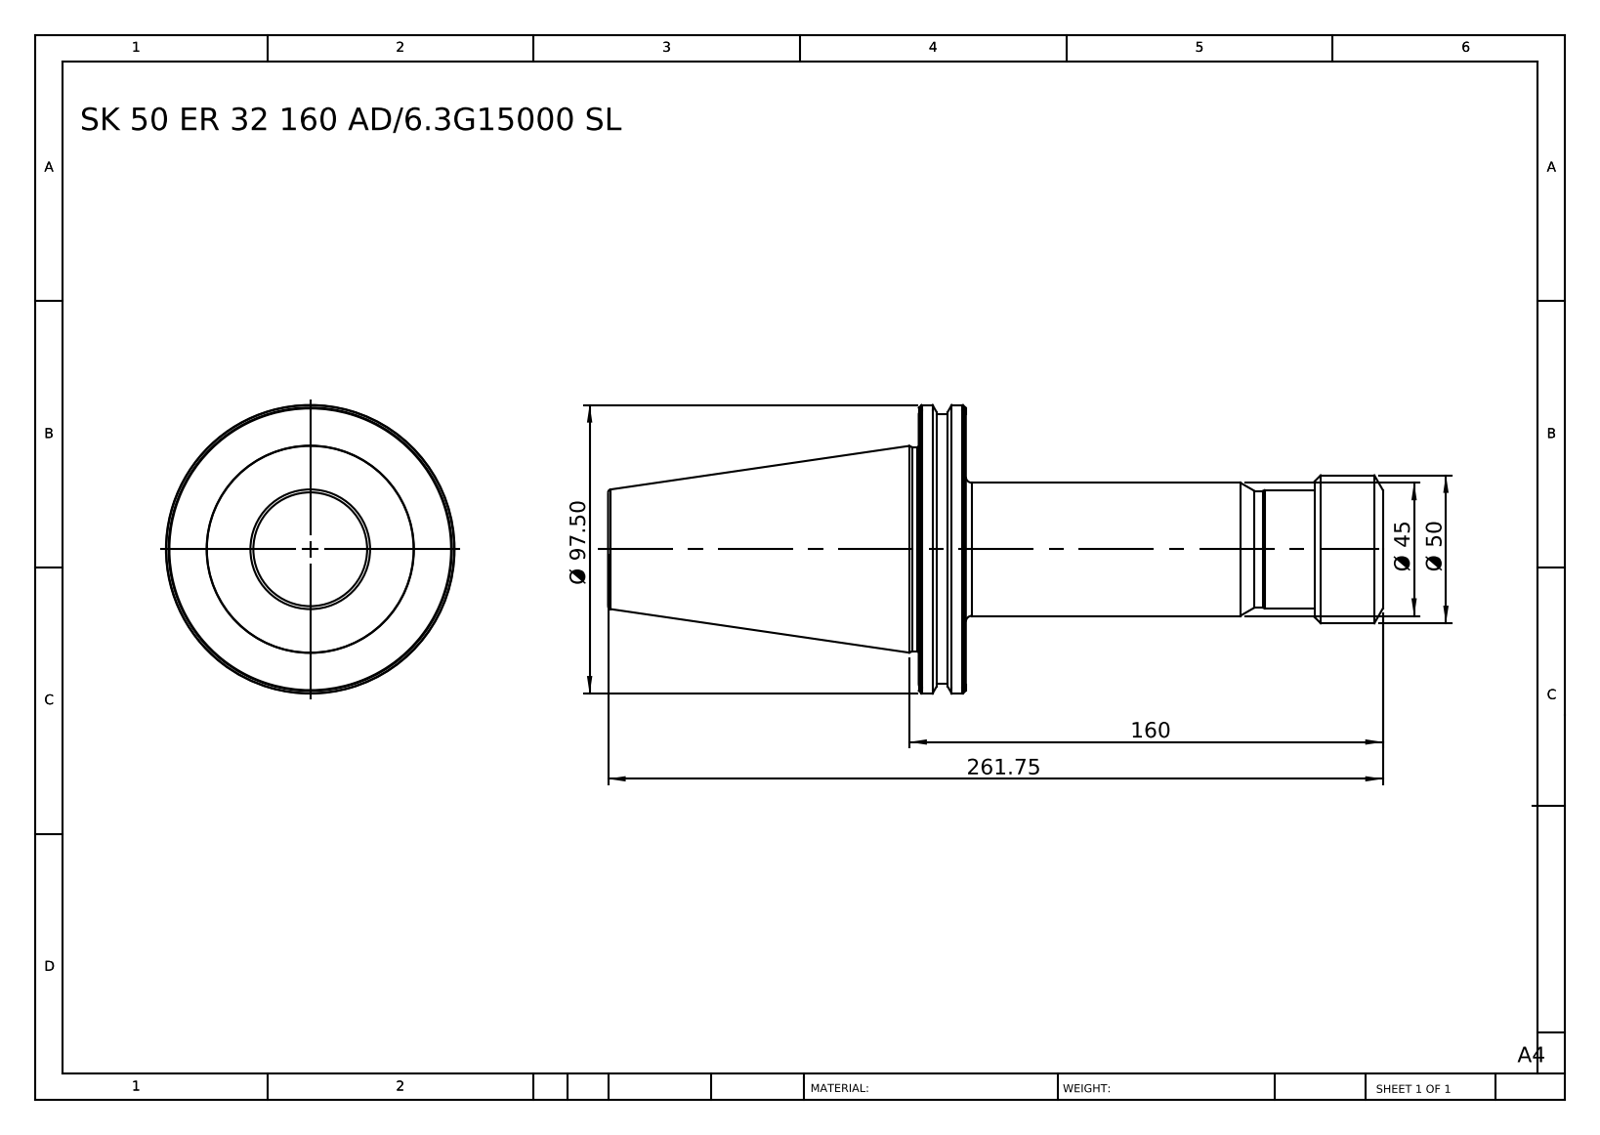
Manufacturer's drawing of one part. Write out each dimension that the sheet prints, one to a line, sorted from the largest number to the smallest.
261.75
160
Ø 97.50
Ø 50
Ø 45
